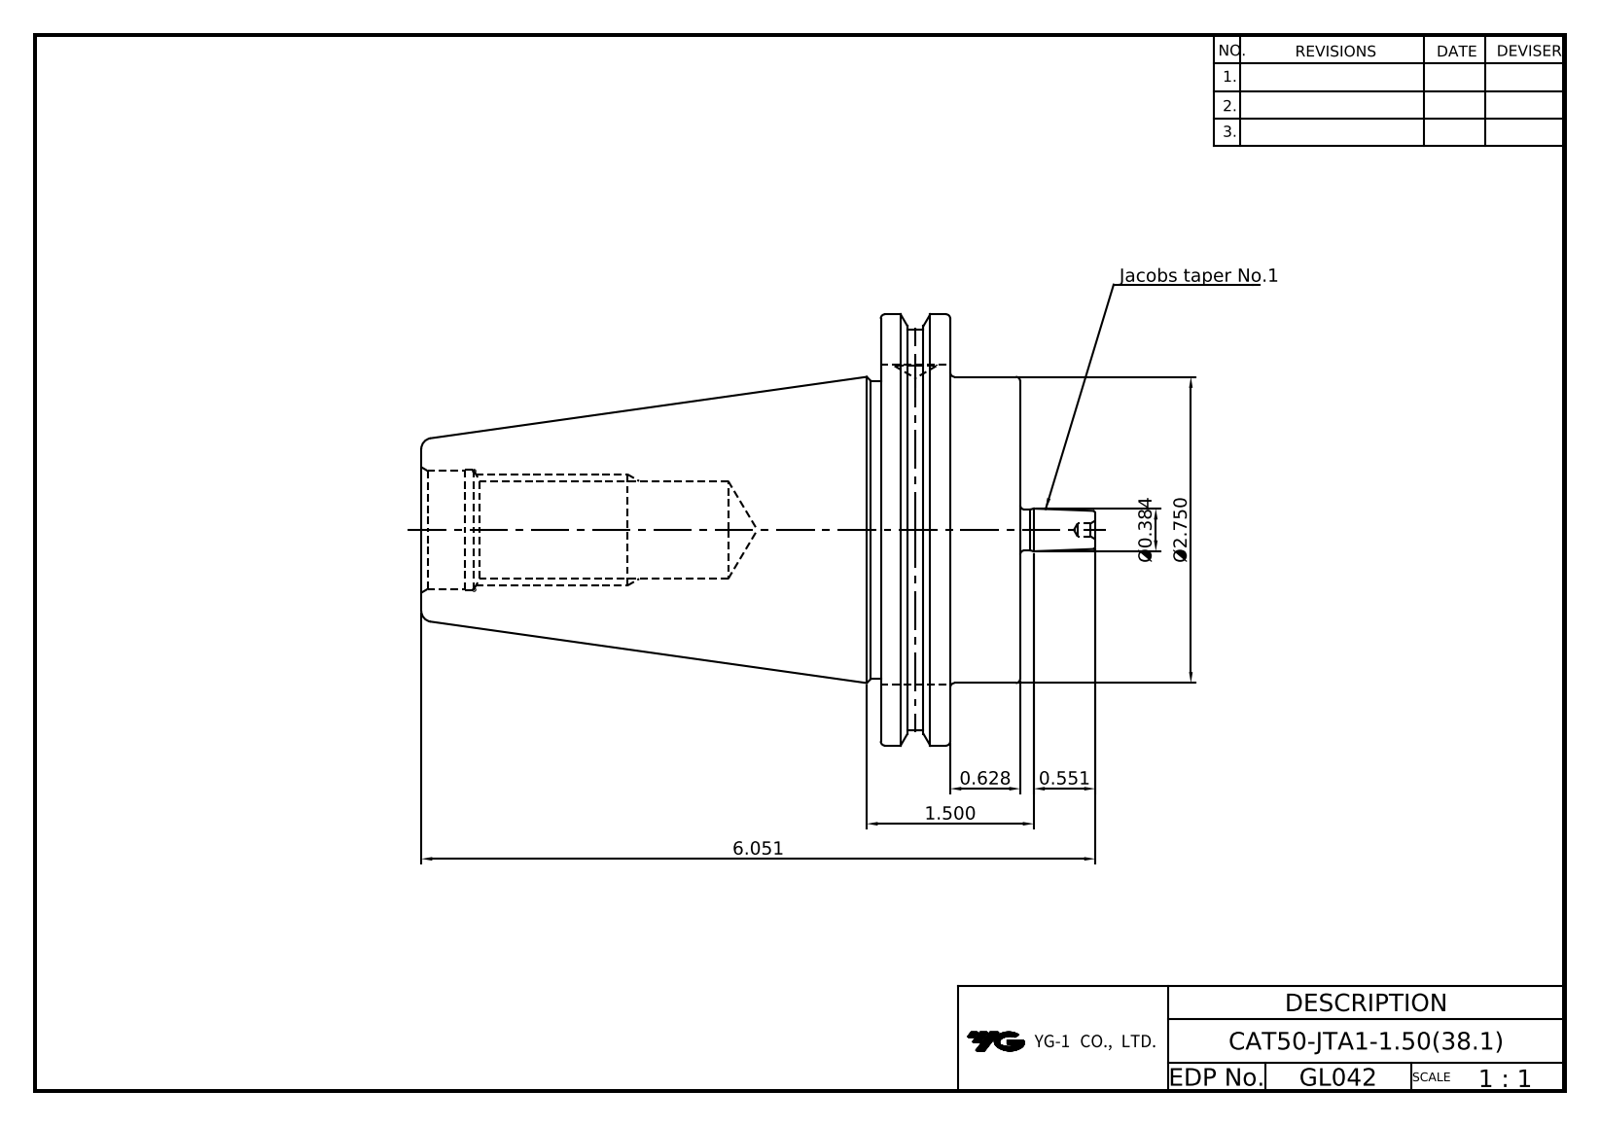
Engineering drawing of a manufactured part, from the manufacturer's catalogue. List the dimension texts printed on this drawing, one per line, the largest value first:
6.051
Ø2.750
1.500
0.628
0.551
Ø0.384
